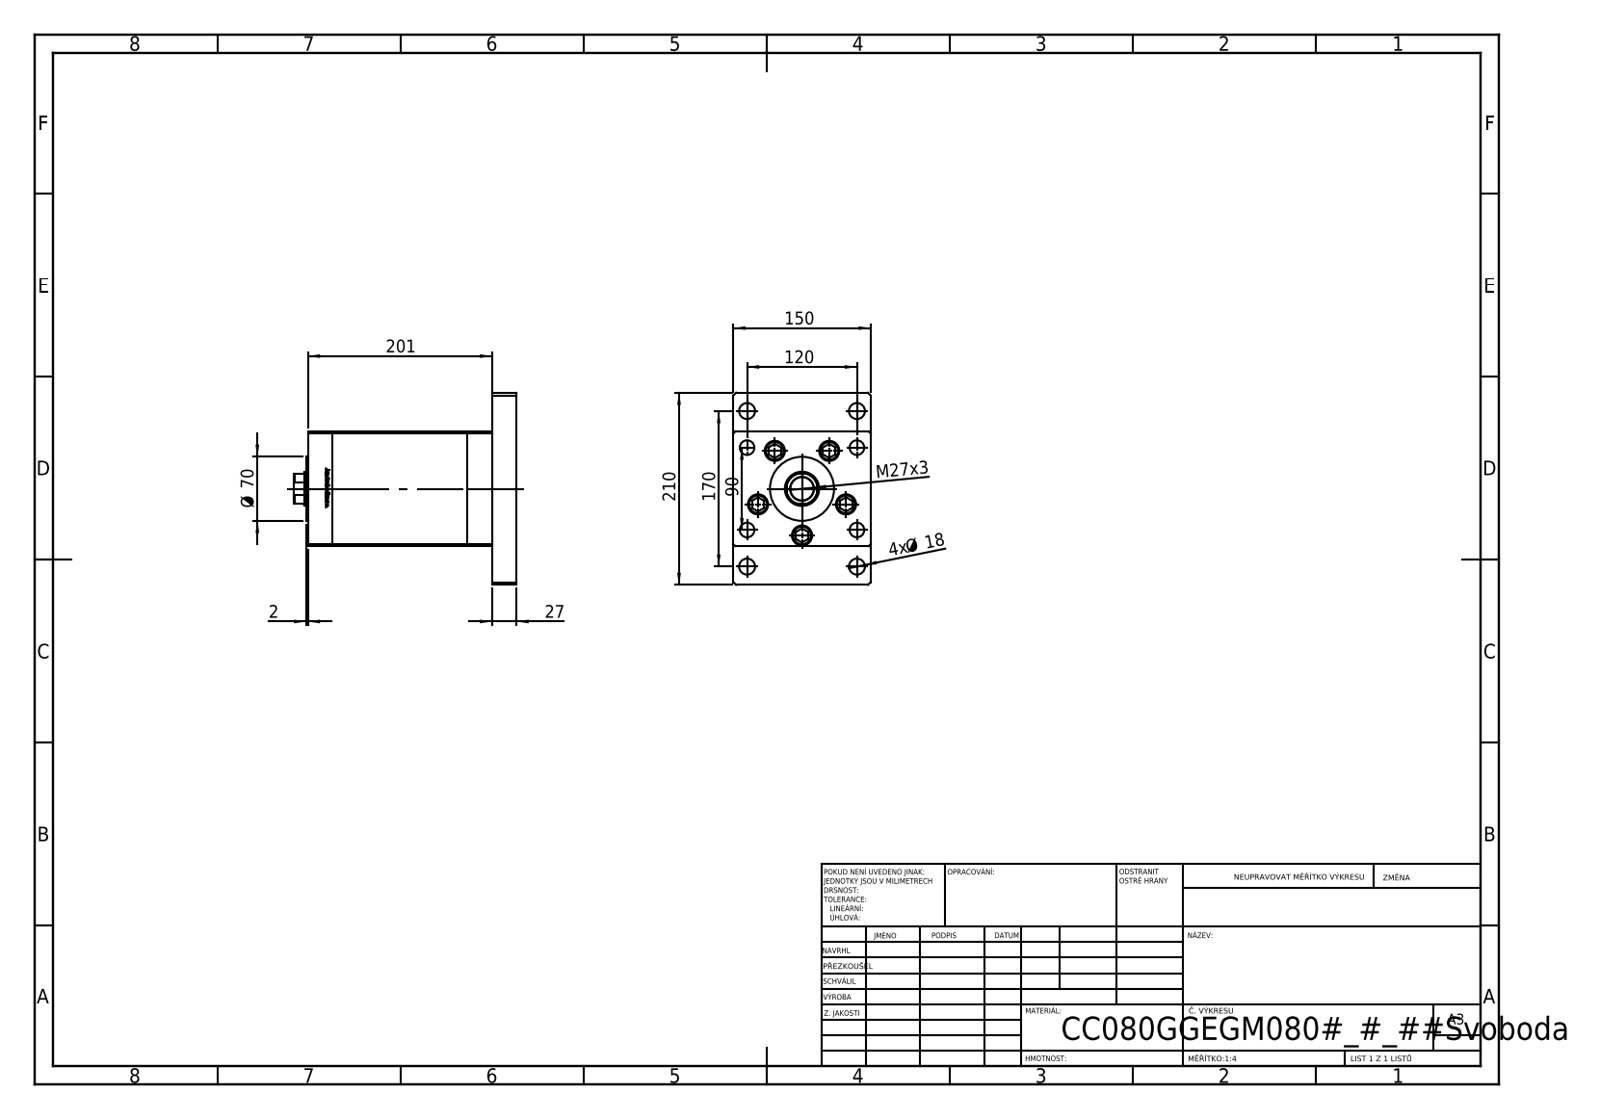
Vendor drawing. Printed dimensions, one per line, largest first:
210
201
170
150
120
90
Ø 70
27
M27x3
4x Ø 18
2
